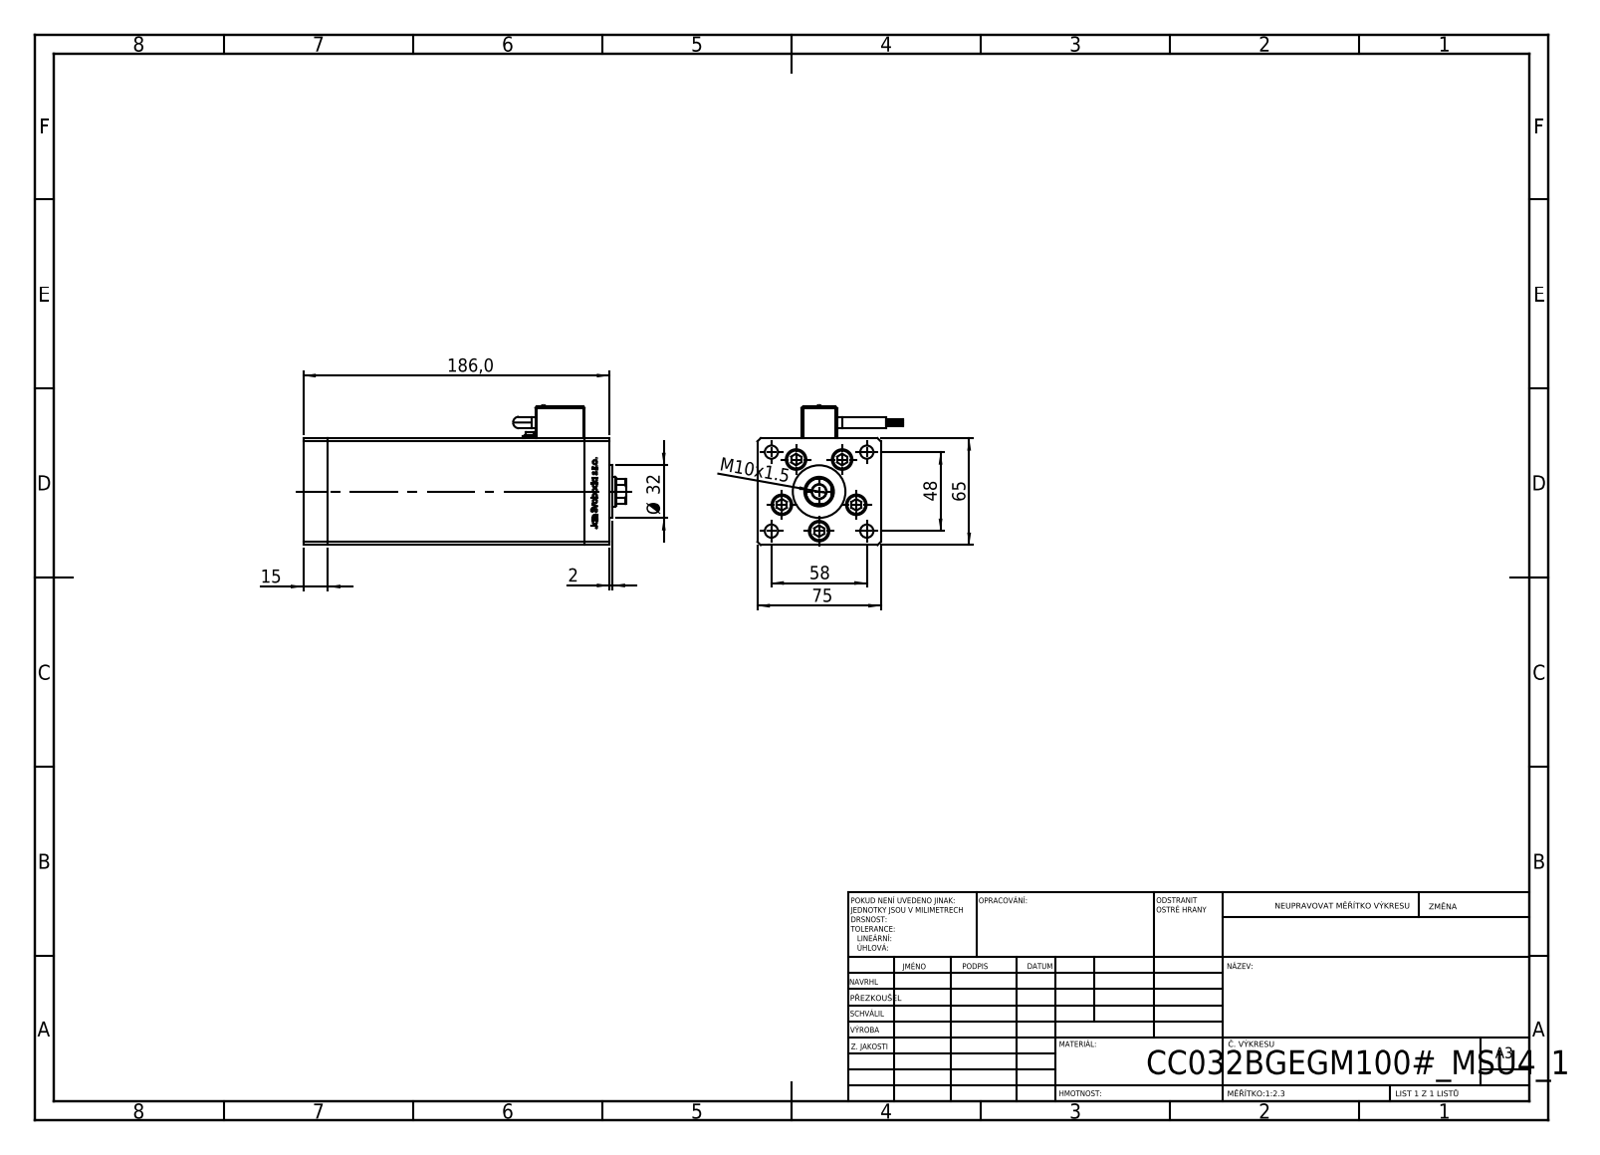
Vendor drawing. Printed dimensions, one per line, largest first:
186,0
75
65
58
48
Ø 32
15
M10x1.5
2
